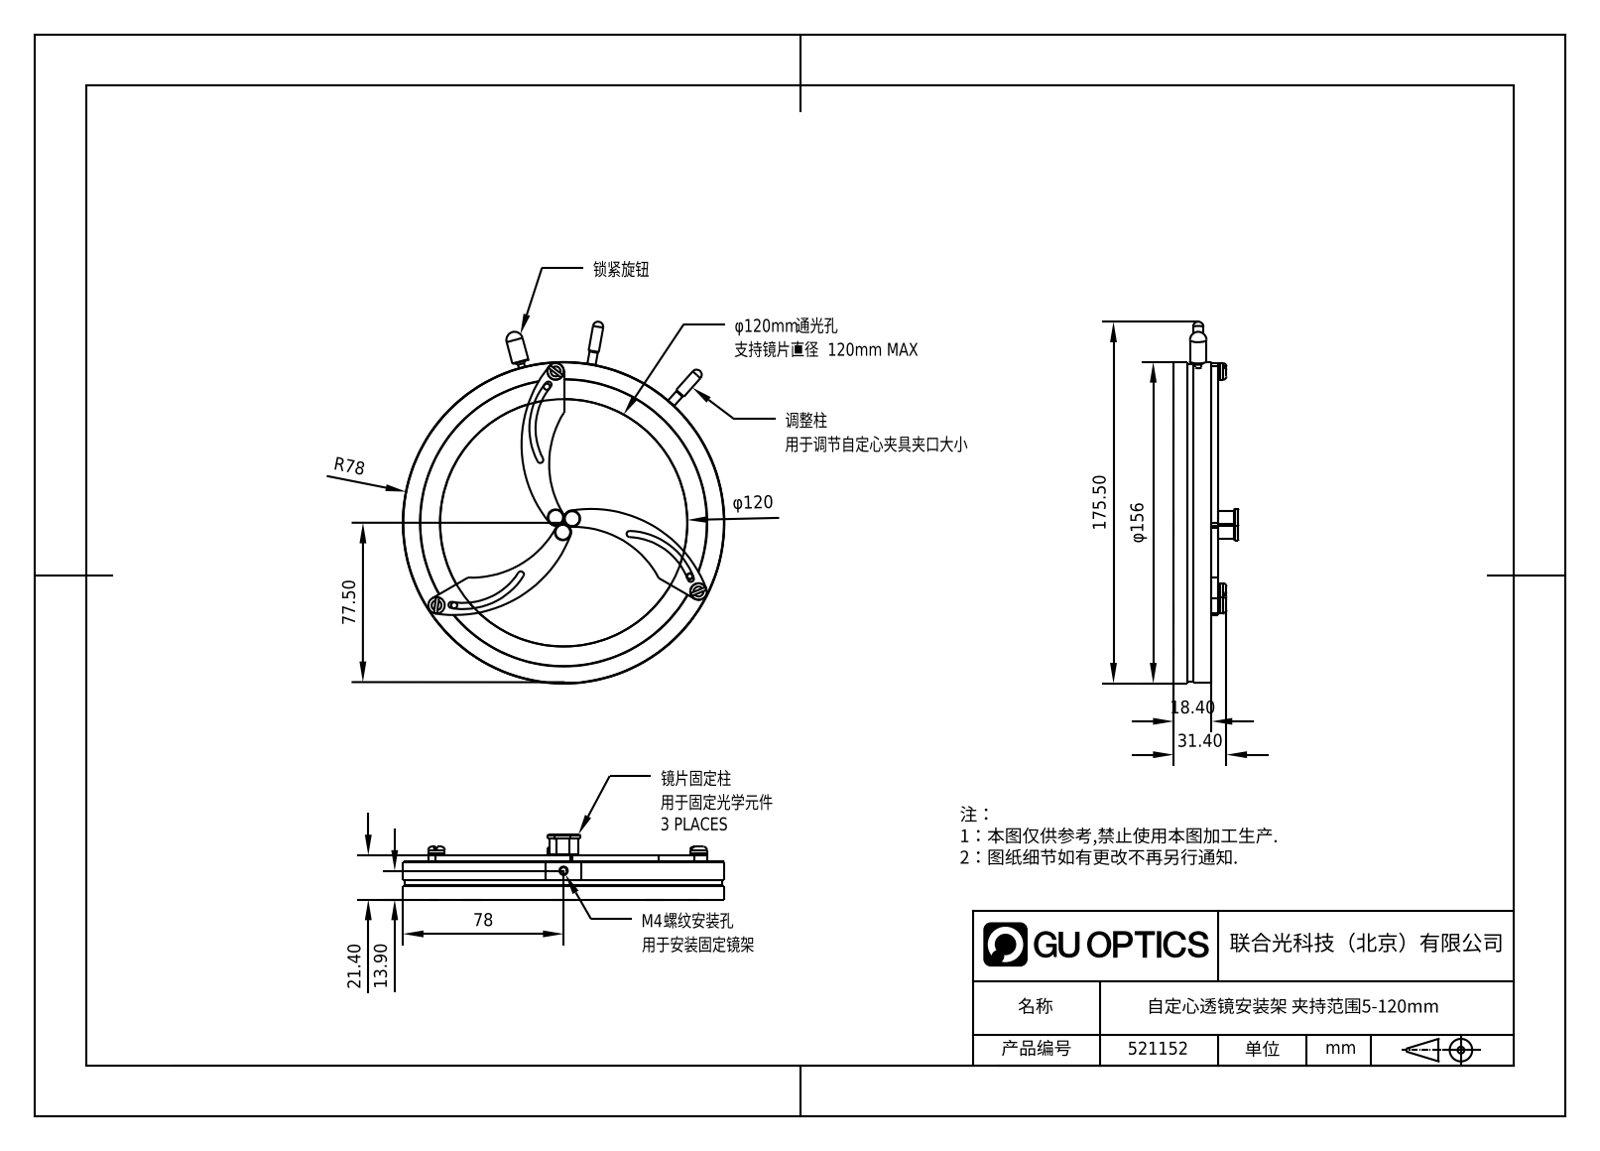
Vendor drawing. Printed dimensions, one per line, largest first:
175.50
φ156
φ120
R78
78
77.50
31.40
21.40
18.40
13.90
